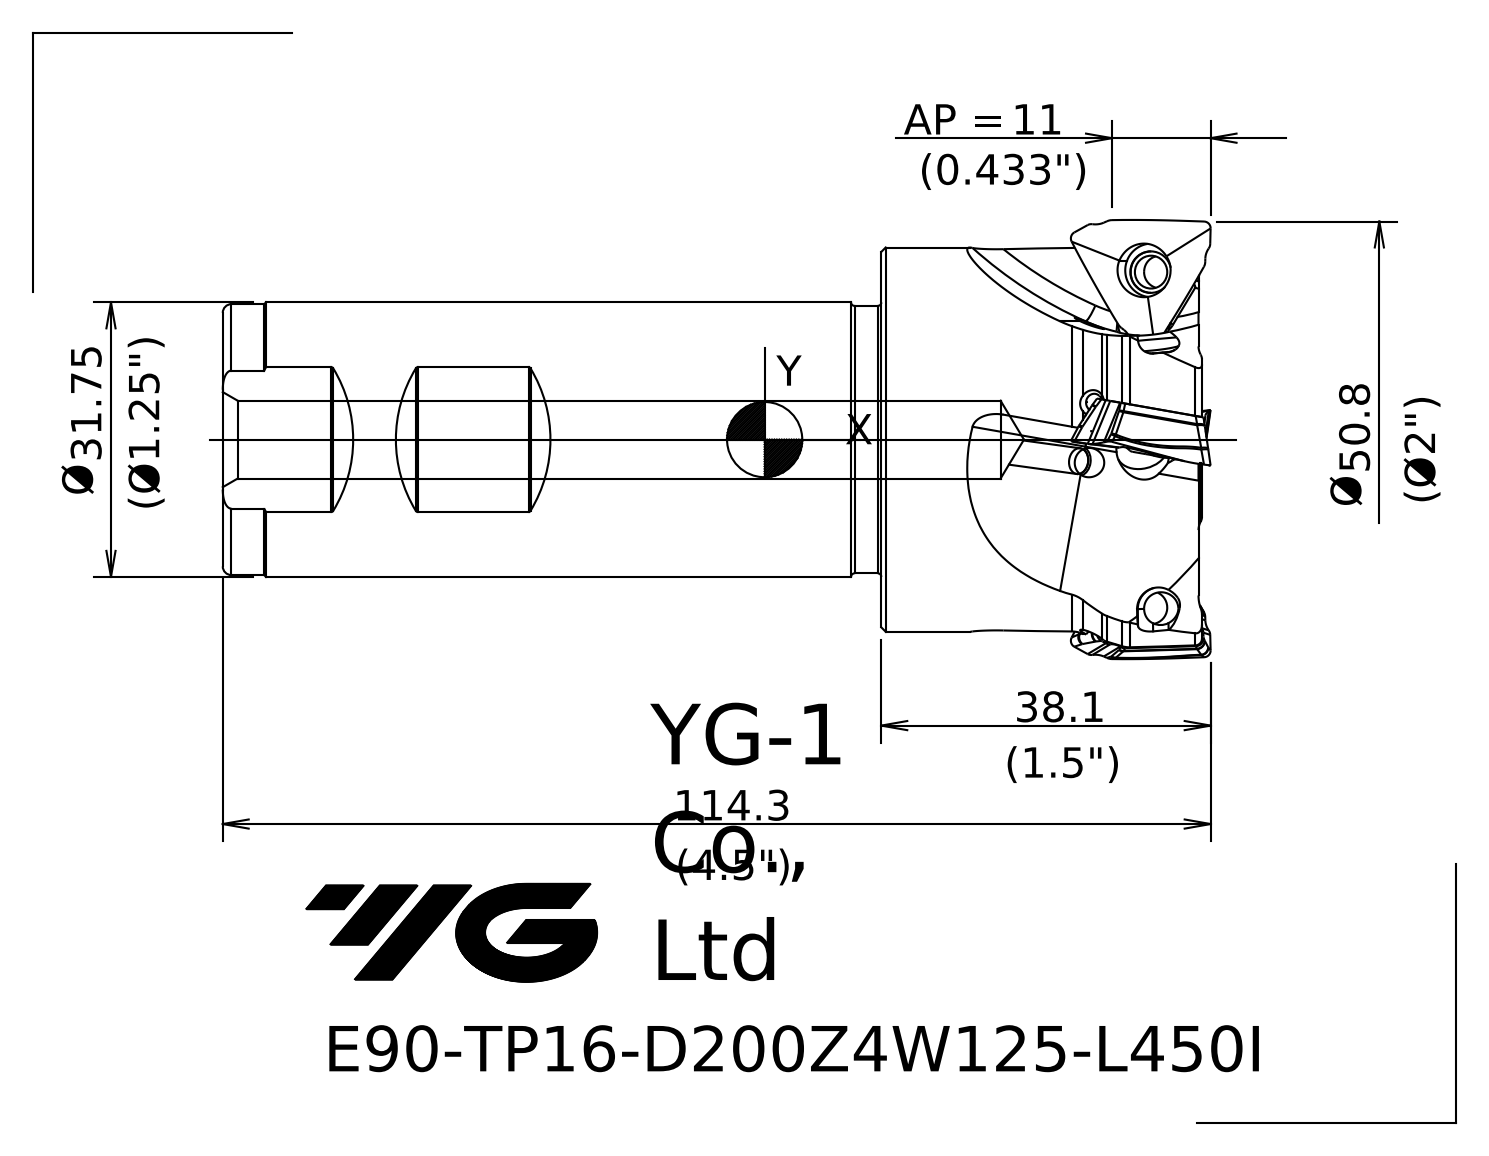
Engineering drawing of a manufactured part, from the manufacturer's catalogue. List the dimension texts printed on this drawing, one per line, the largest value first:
114.3
50.8 Ø
38.1
31.75 Ø
11 AP =
